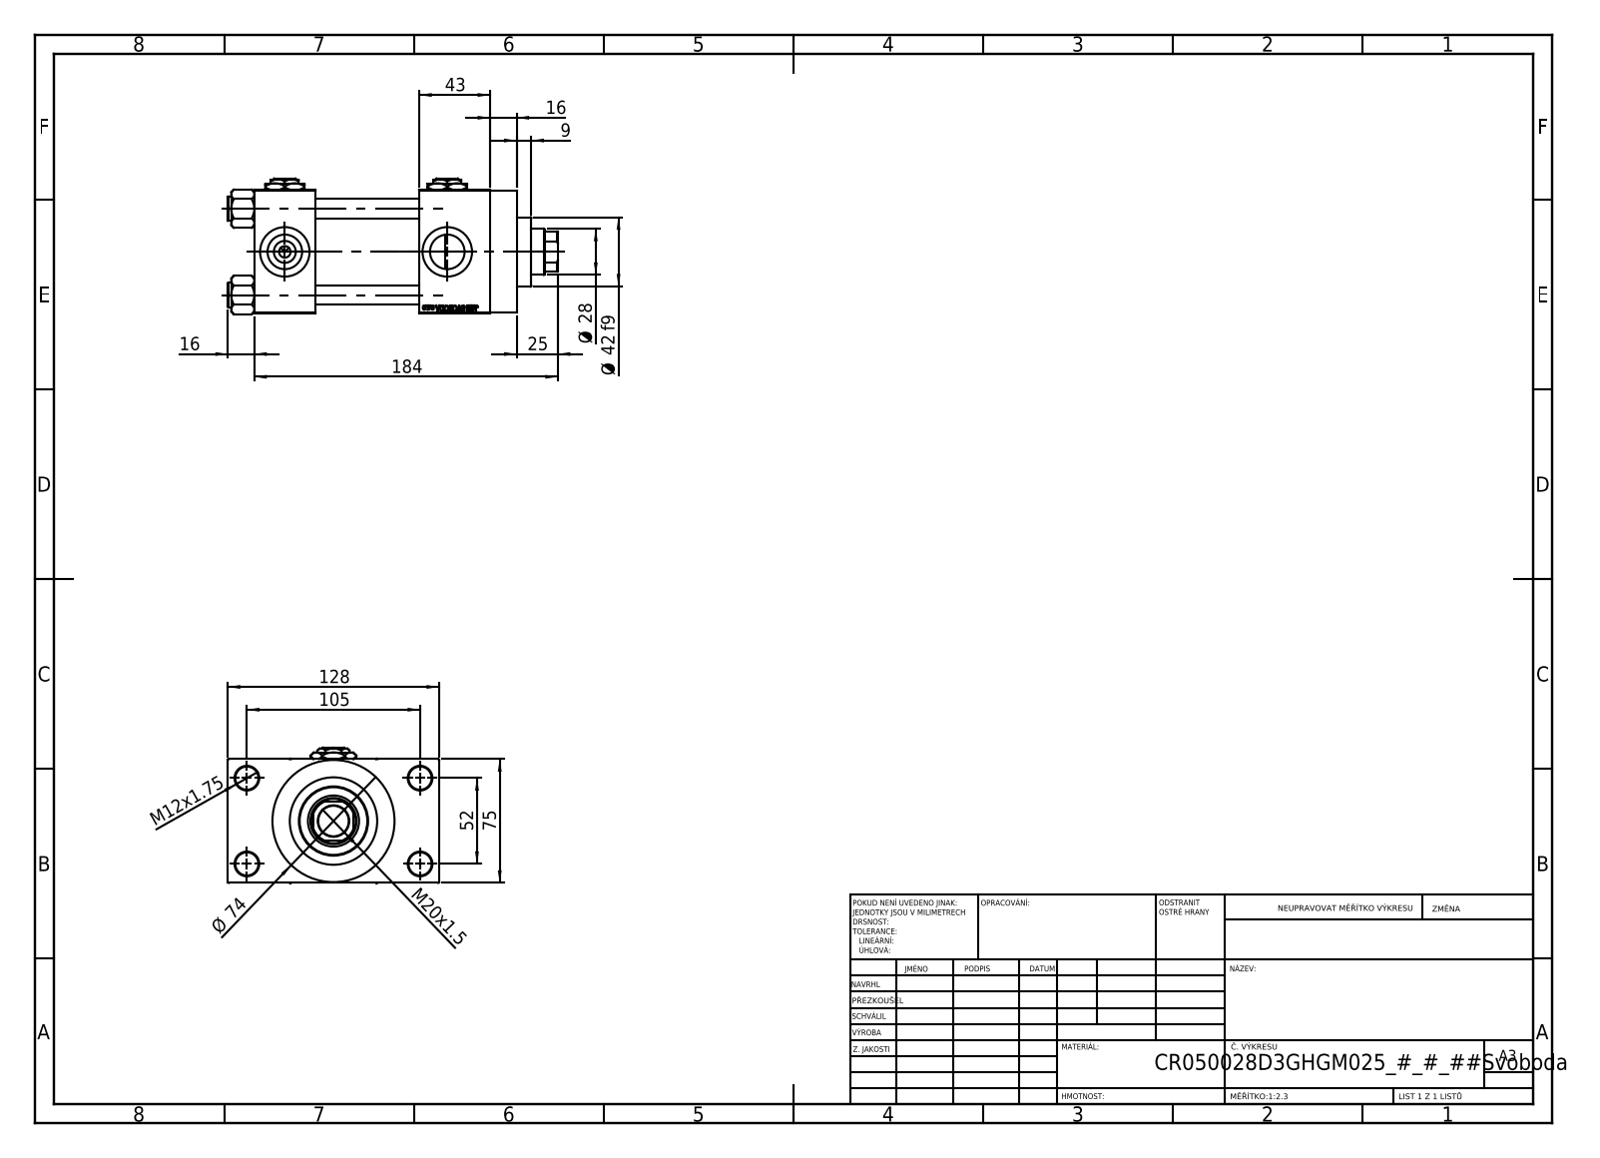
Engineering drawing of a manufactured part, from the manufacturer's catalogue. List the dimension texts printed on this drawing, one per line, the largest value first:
184
128
105
75
Ø 74
52
43
Ø 42 f9
Ø 28
25
M20x1.5
16
16
M12x1.75
9
